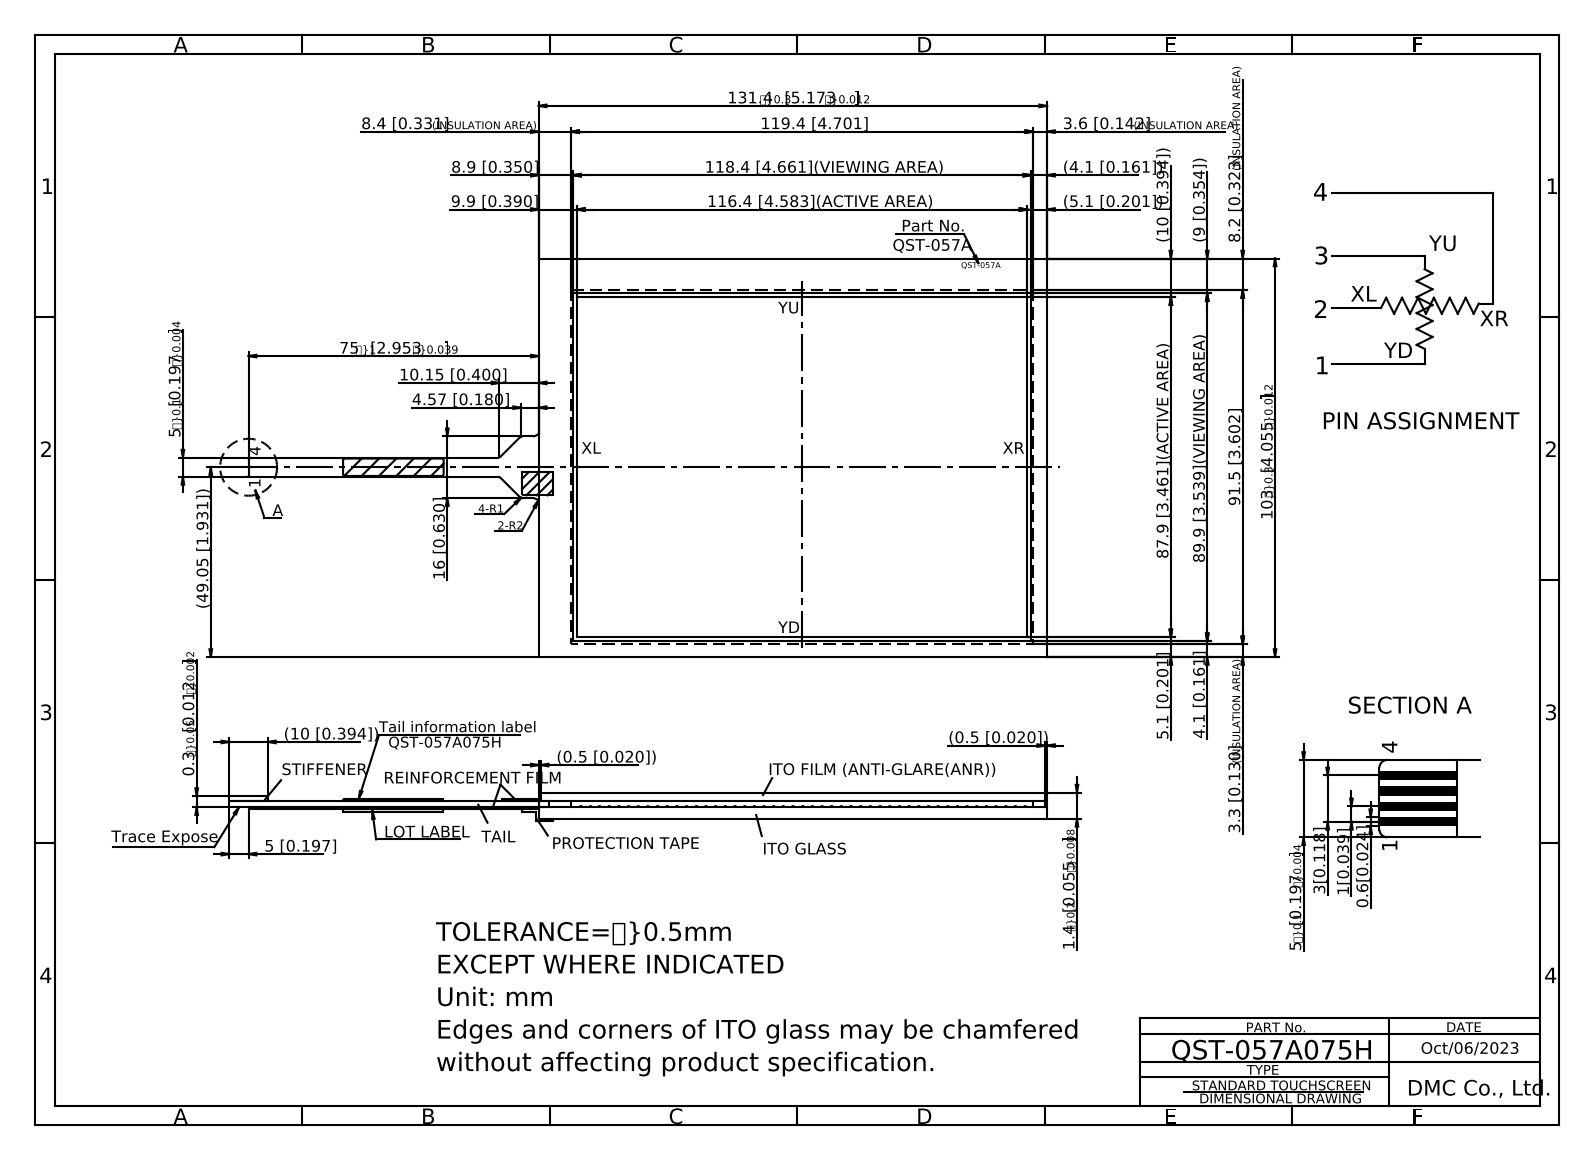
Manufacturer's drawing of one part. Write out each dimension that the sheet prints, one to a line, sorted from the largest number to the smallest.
131.40
119.4 [4.701]
118.4 [4.661](VIEWING AREA)
116.4 [4.583](ACTIVE AREA)
103.00
91.5 [3.602]
89.9 [3.539](VIEWING AREA)
87.9 [3.461](ACTIVE AREA)
75.00
(49.05 [1.931])
16 [0.630]
10.15 [0.400]
(10 [0.394])
(10 [0.394])
9.9 [0.390]
(9 [0.354])
8.9 [0.350]
8.40{\H0.6667x;(INSULATION AREA)}
8.20{\H0.6667x;(INSULATION AREA)}
5.1 [0.201]
(5.1 [0.201])
5{\H0.6667x;?}0.1}[0.197{\H0.6667x;?}0.004}]
5.00
5 [0.197]
4.57 [0.180]
4.1 [0.161]
(4.1 [0.161])
3.60{\H0.6667x;(INSULATION AREA)}
3.30{\H0.6667x;(INSULATION AREA)}
3[0.118]
1.4{\H0.6667x;?}0.2}[0.055{\H0.6667x;?}0.008}]
1[0.039]
0.6[0.024]
(0.5 [0.020])
(0.5 [0.020])
0.3{\H0.6667x;?}0.05}[0.012{\H0.6667x;?}0.002}]
